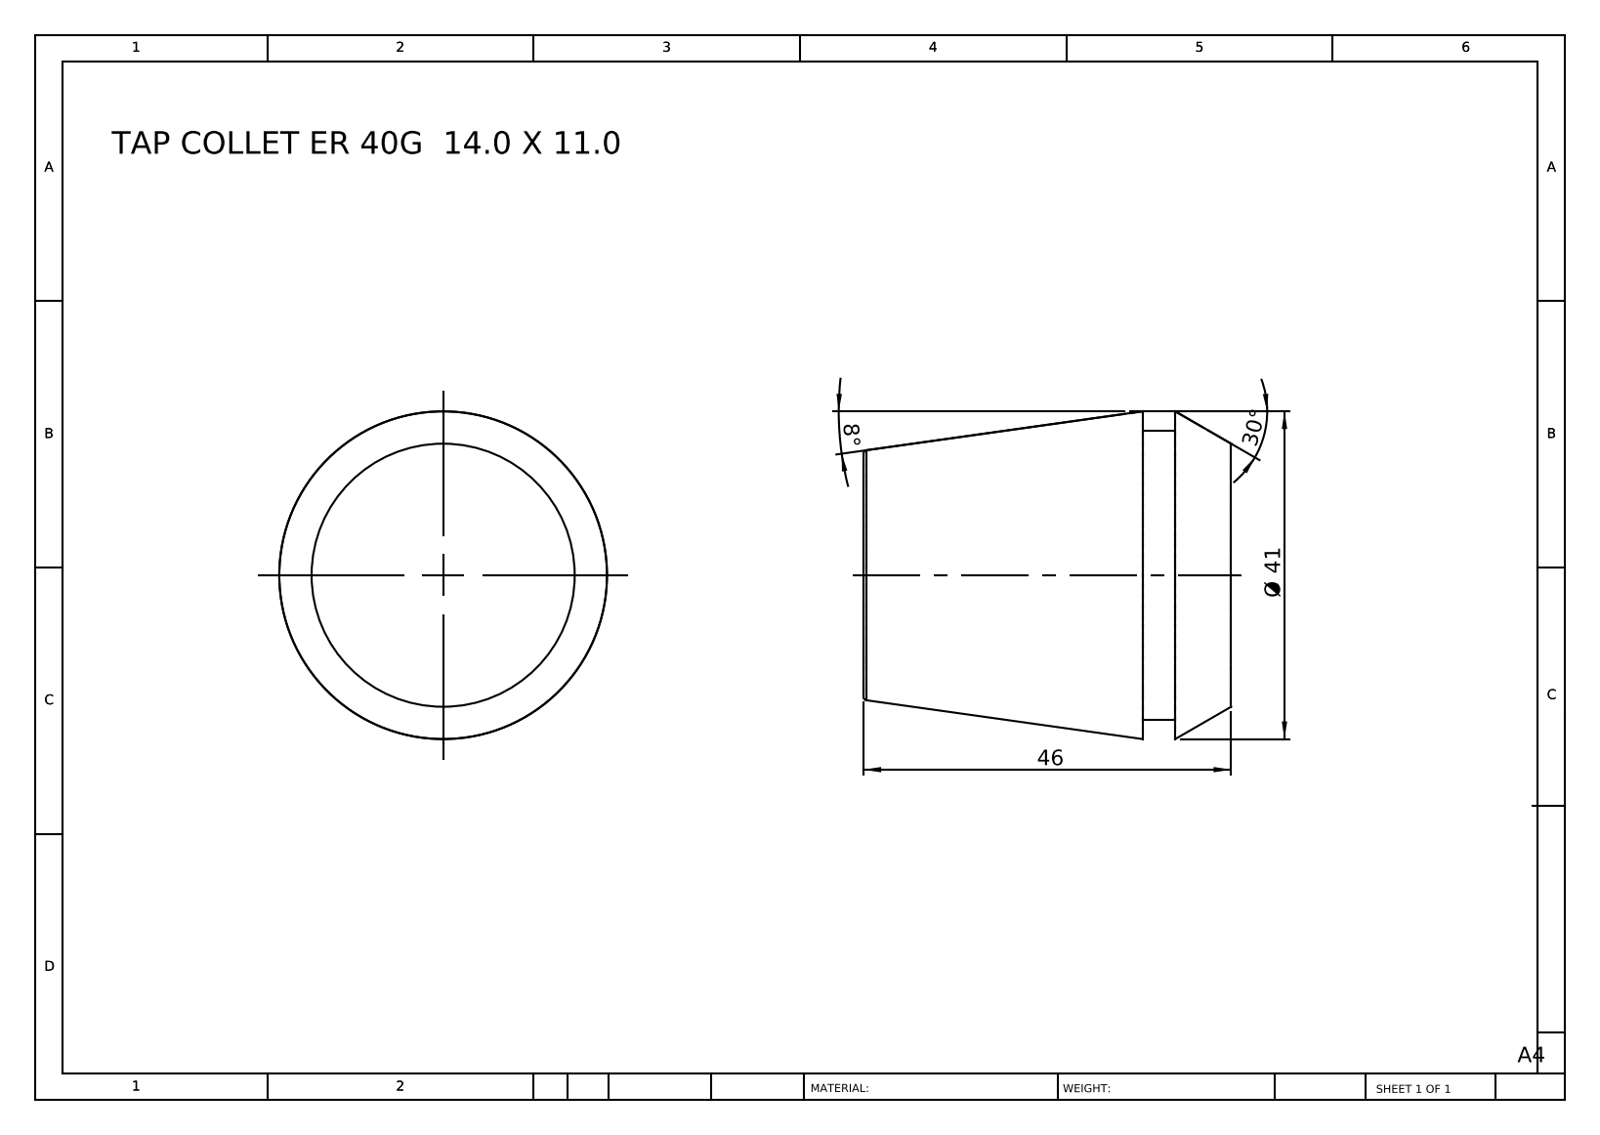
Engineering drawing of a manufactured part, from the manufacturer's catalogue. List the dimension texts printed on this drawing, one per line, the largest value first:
46
Ø 41
30°
8°
